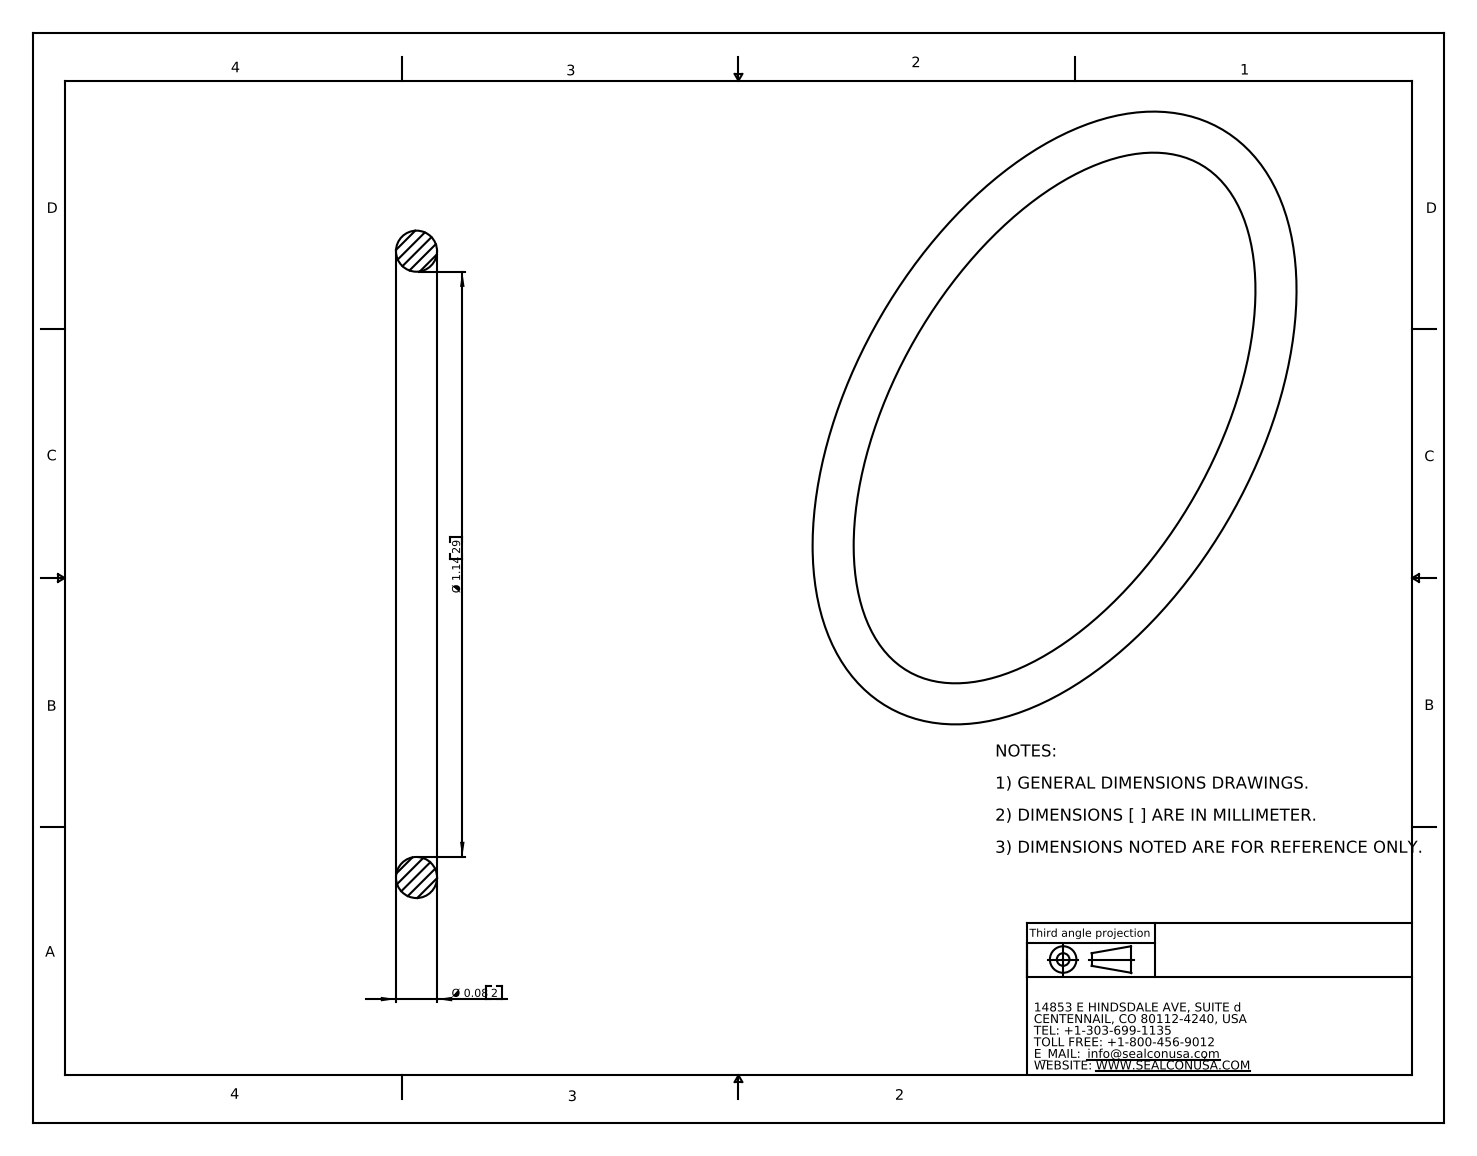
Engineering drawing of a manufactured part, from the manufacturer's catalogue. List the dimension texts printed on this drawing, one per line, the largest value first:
Ø 1.14 29
Ø 0.08 2
